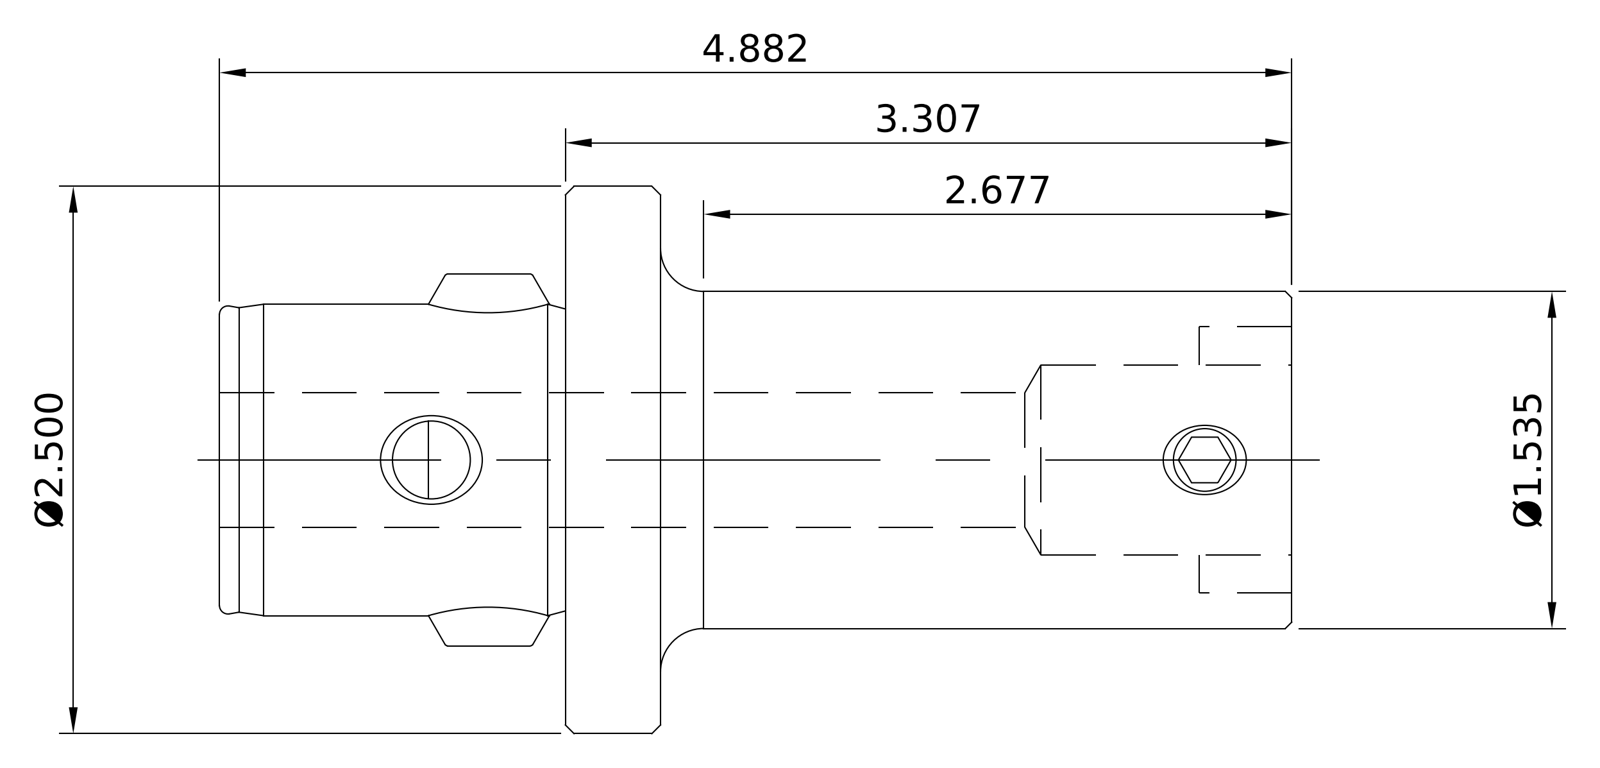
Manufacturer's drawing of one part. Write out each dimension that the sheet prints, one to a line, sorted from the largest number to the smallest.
4.882
3.307
2.677
Ø2.500
Ø1.535
